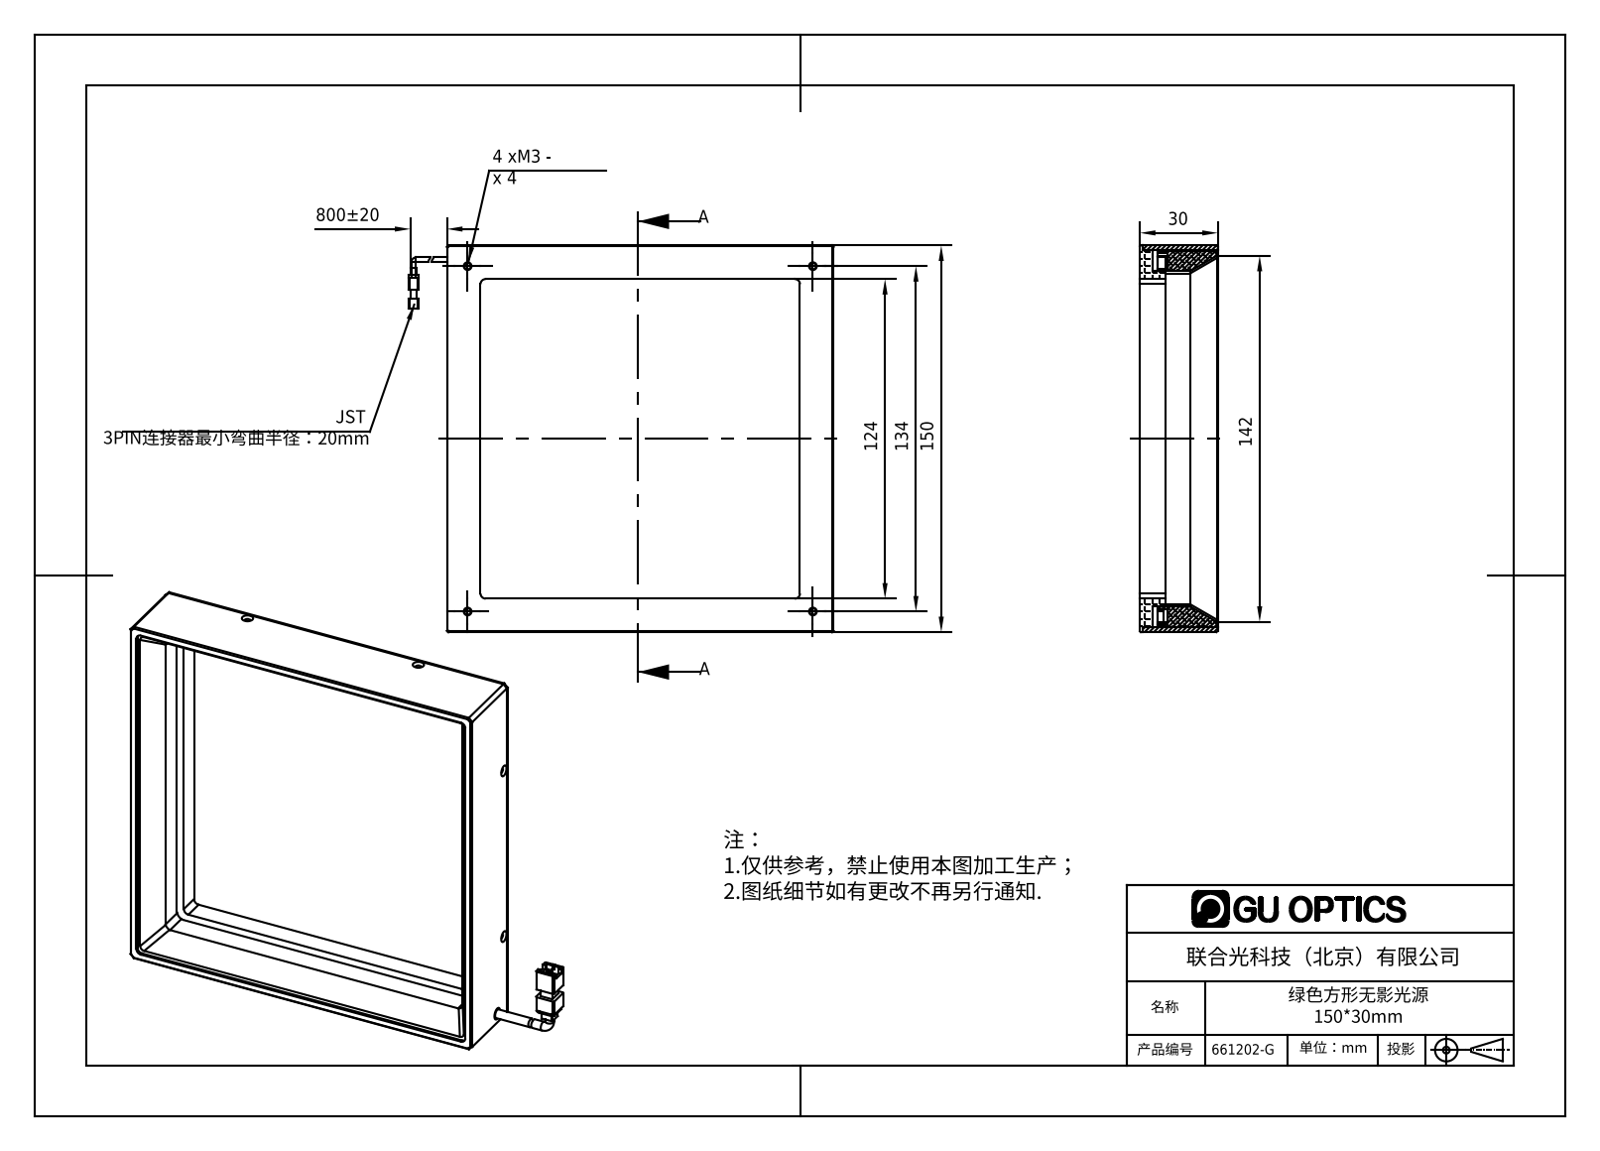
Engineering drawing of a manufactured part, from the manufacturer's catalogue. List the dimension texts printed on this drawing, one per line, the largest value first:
800±20
150
142
134
124
30
